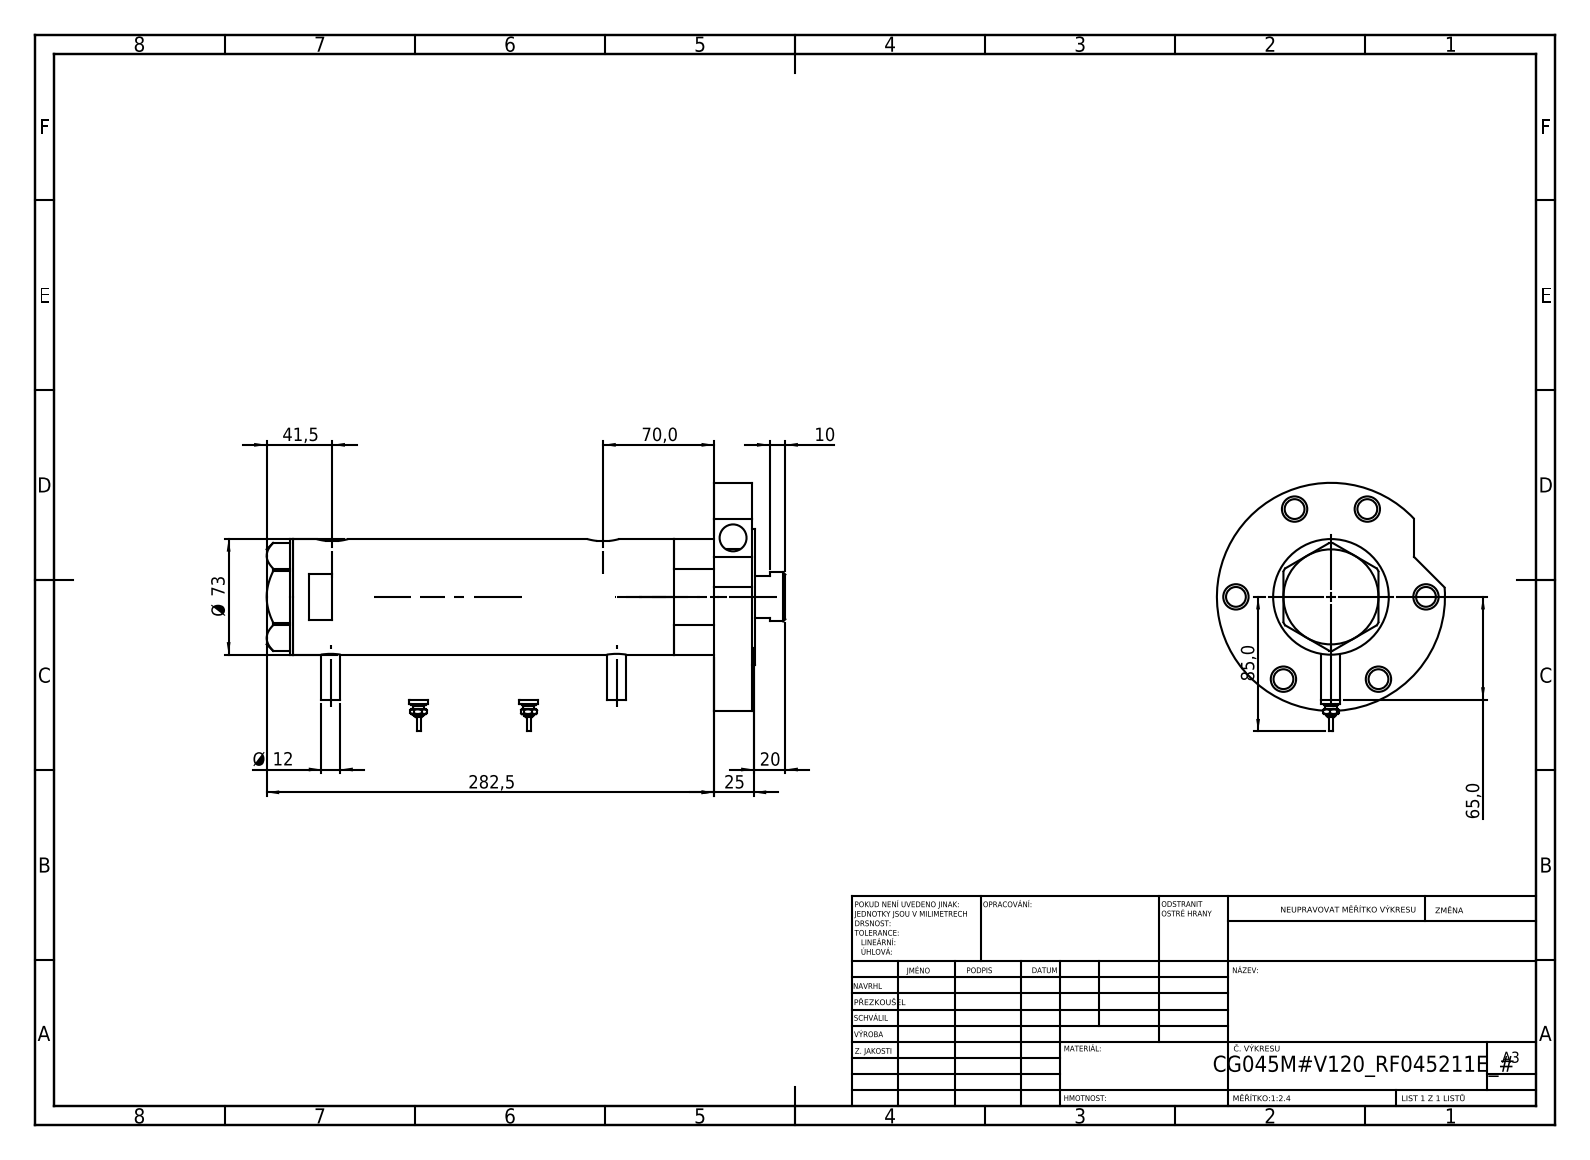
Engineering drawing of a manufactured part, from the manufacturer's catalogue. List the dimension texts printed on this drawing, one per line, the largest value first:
282,5
85,0
Ø 73
70,0
65,0
41,5
25
20
Ø 12
10
